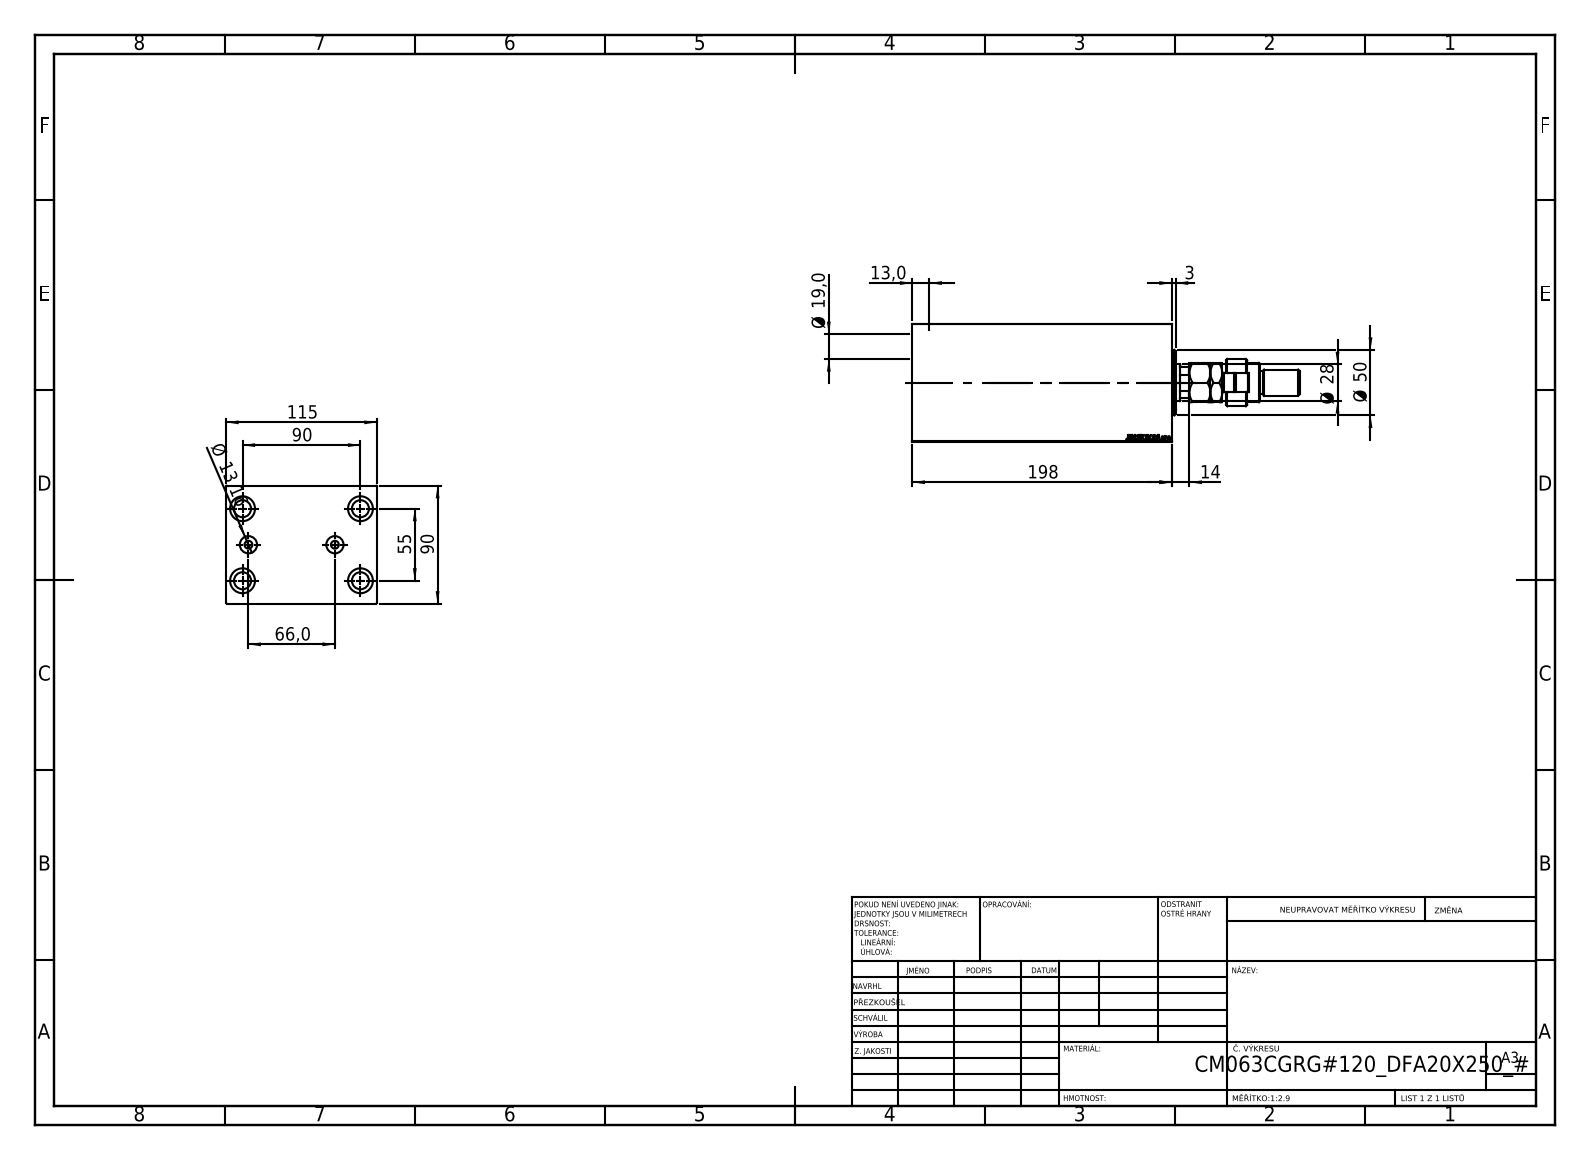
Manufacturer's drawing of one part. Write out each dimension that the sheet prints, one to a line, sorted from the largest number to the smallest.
198
115
90
90
66,0
55
Ø 50
Ø 28
Ø 19,0
14
Ø 13,16
13,0
3
